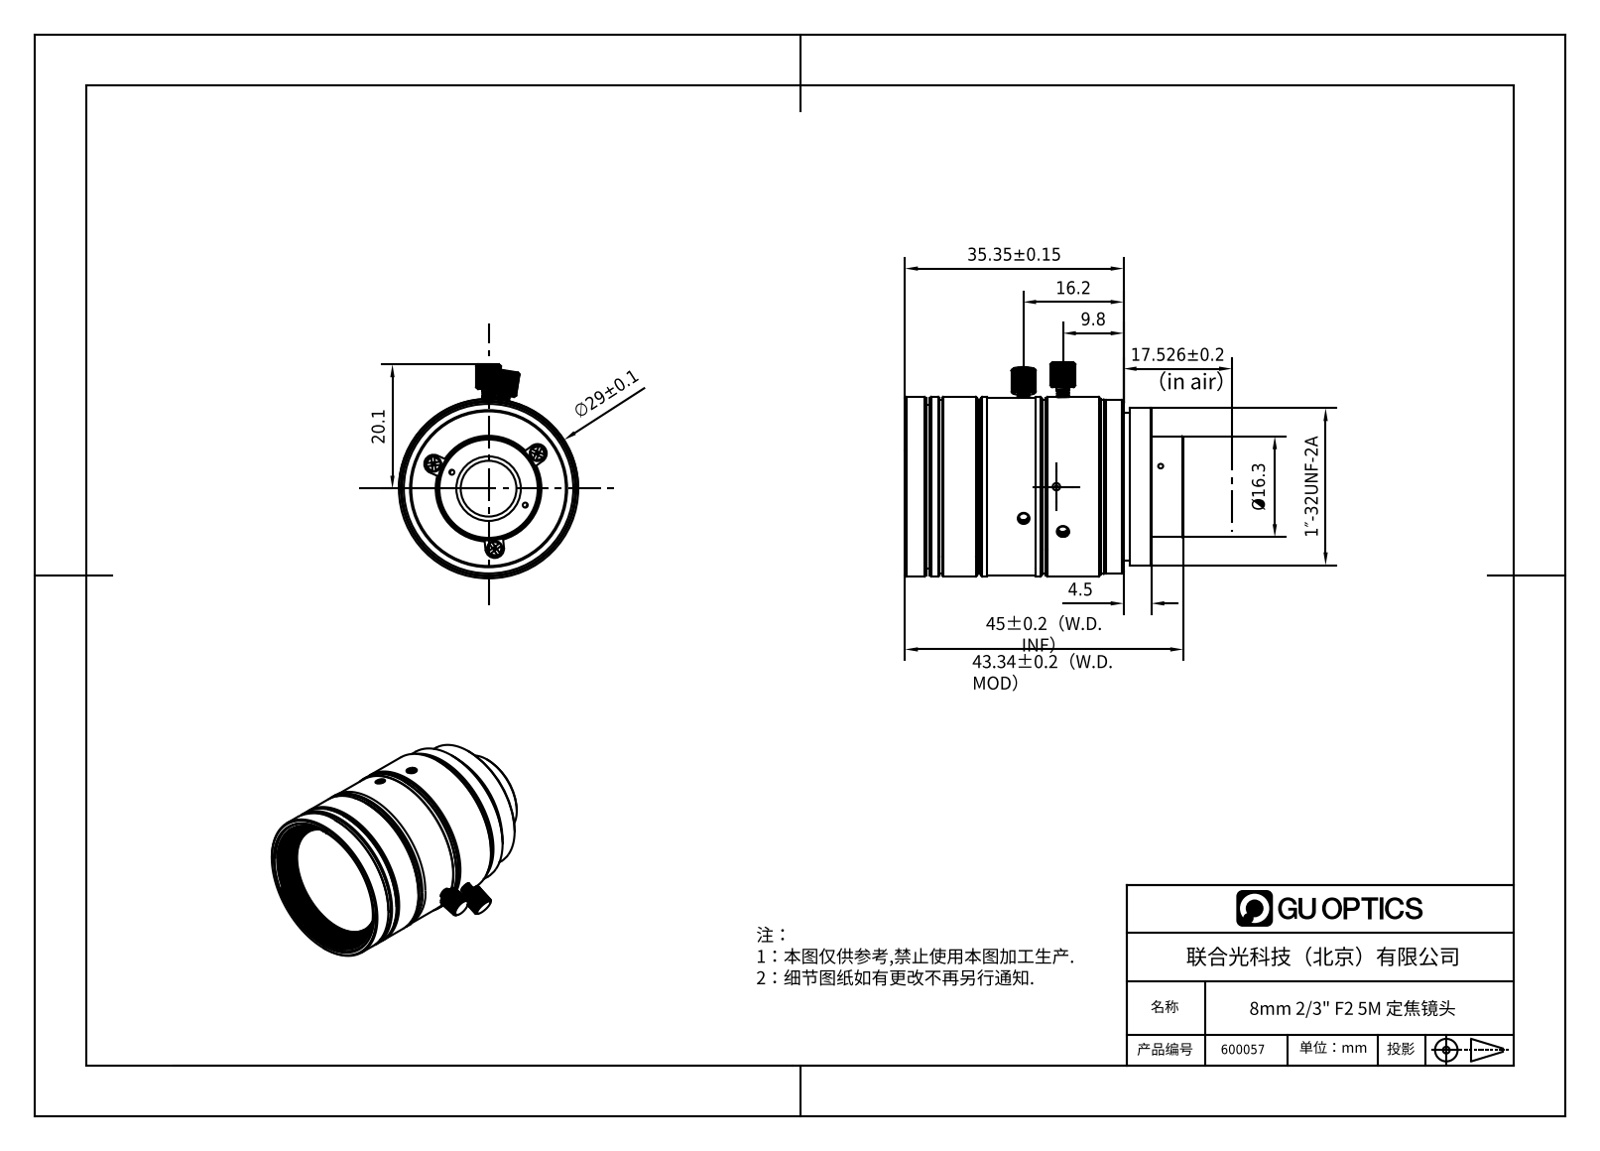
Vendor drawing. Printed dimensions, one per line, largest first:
45±0.2（W.D. INF）
35.35±0.15
∅29±0.1
20.1
17.526±0.2
Ø16.3
16.2
9.8
4.5
1″-32UNF-2A
